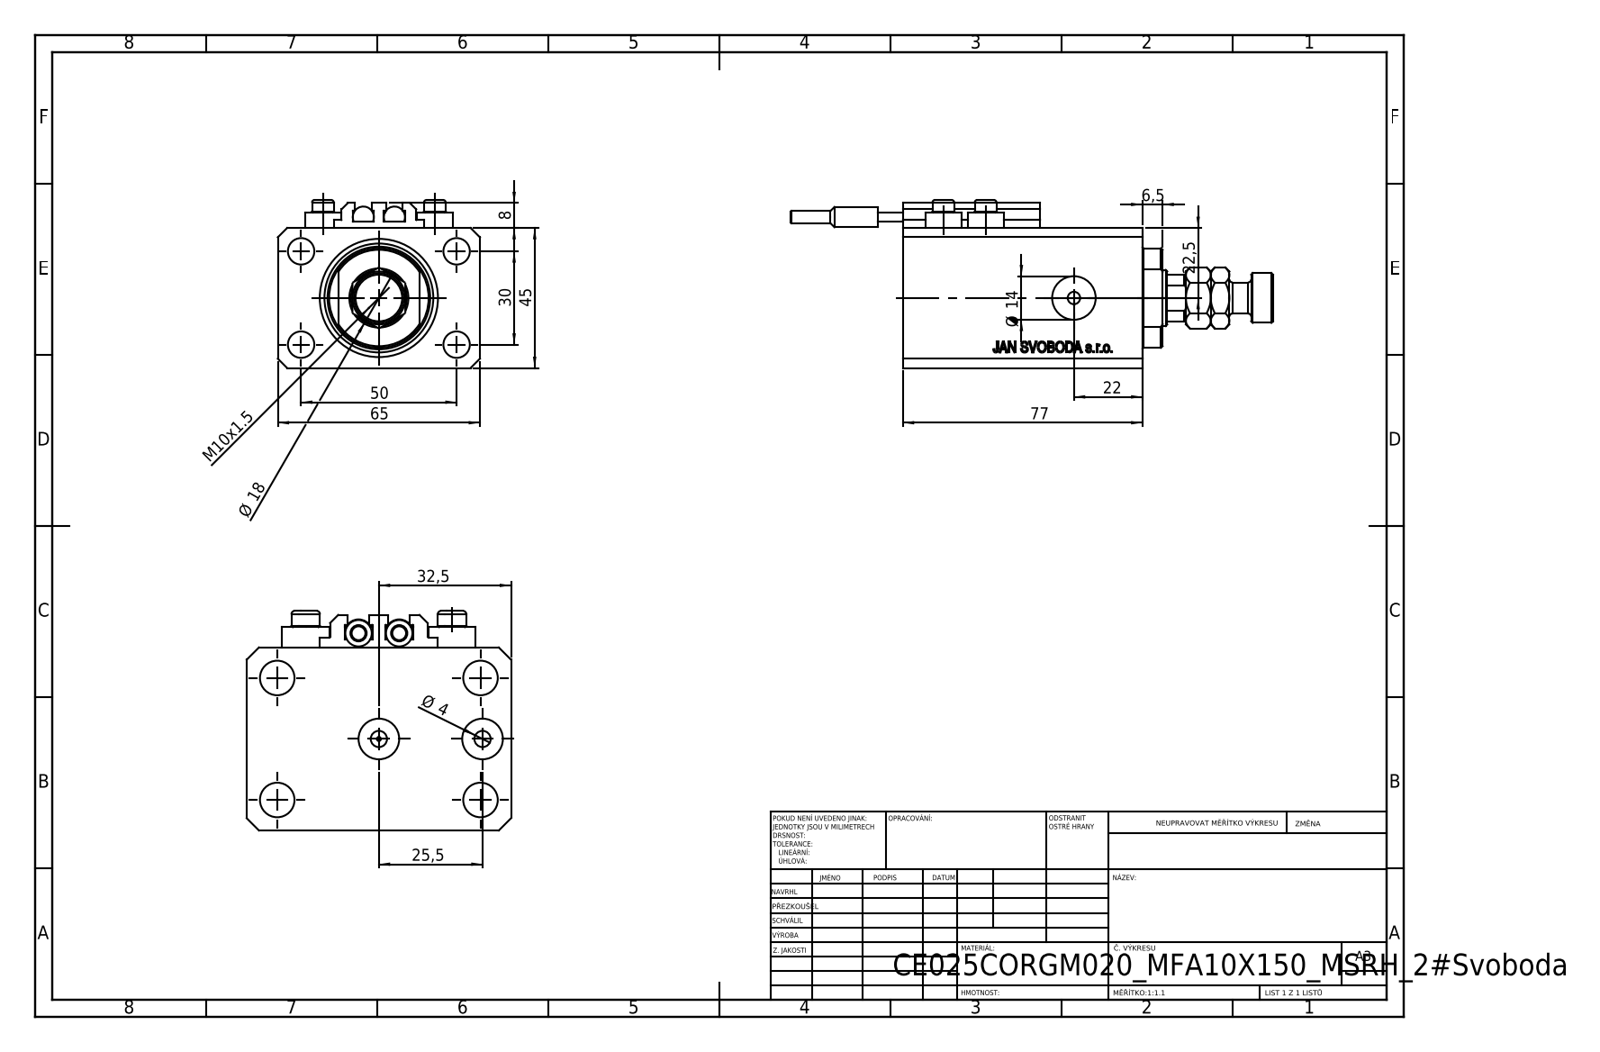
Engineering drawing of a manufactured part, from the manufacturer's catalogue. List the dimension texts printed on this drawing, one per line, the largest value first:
77
65
50
45
32,5
30
25,5
22,5
22
Ø 18
Ø 14
M10x1.5
8
6,5
Ø 4
